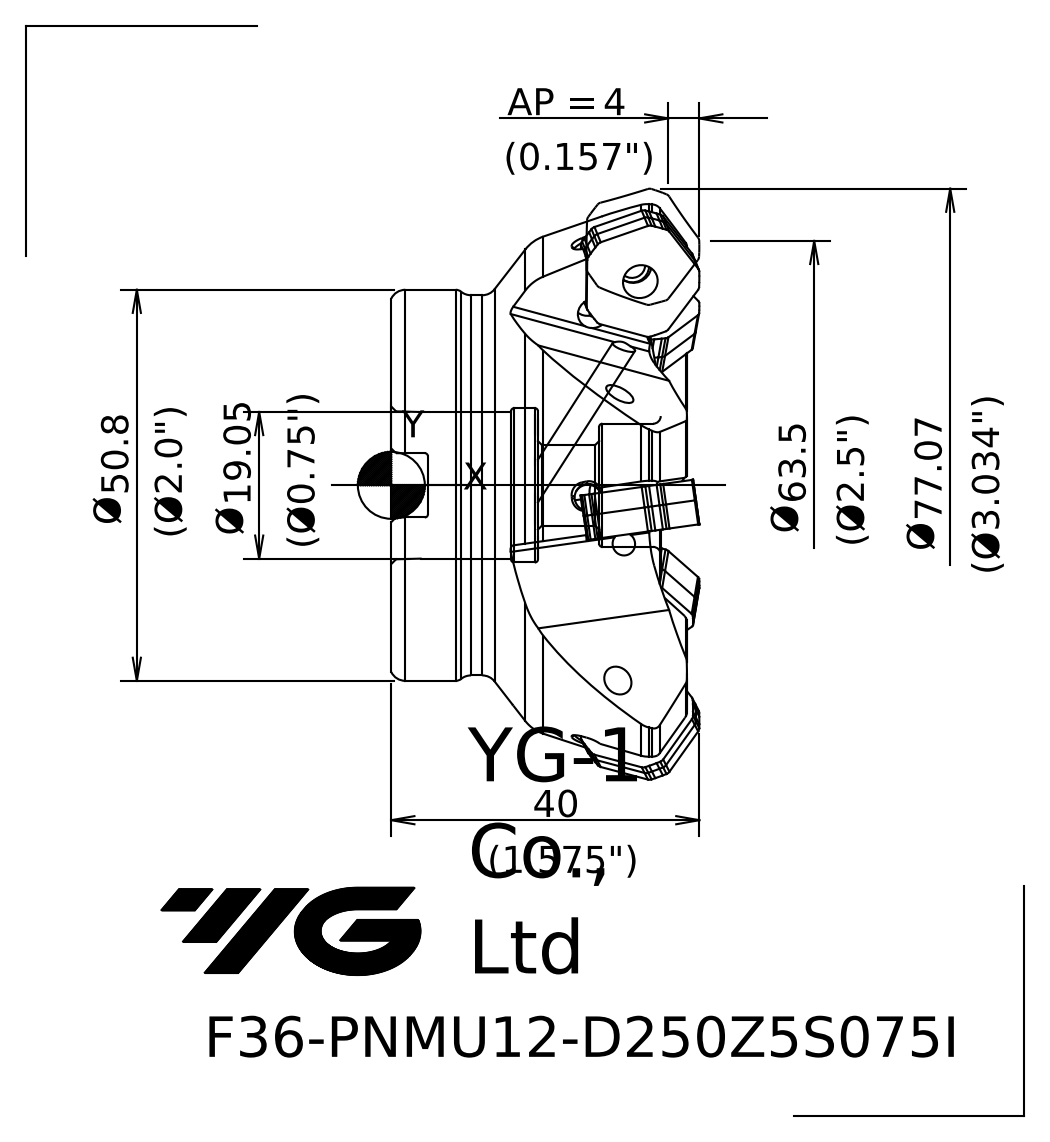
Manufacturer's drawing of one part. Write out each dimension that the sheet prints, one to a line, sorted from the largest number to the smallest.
63.5 Ø
50.8 Ø
19.05 Ø
